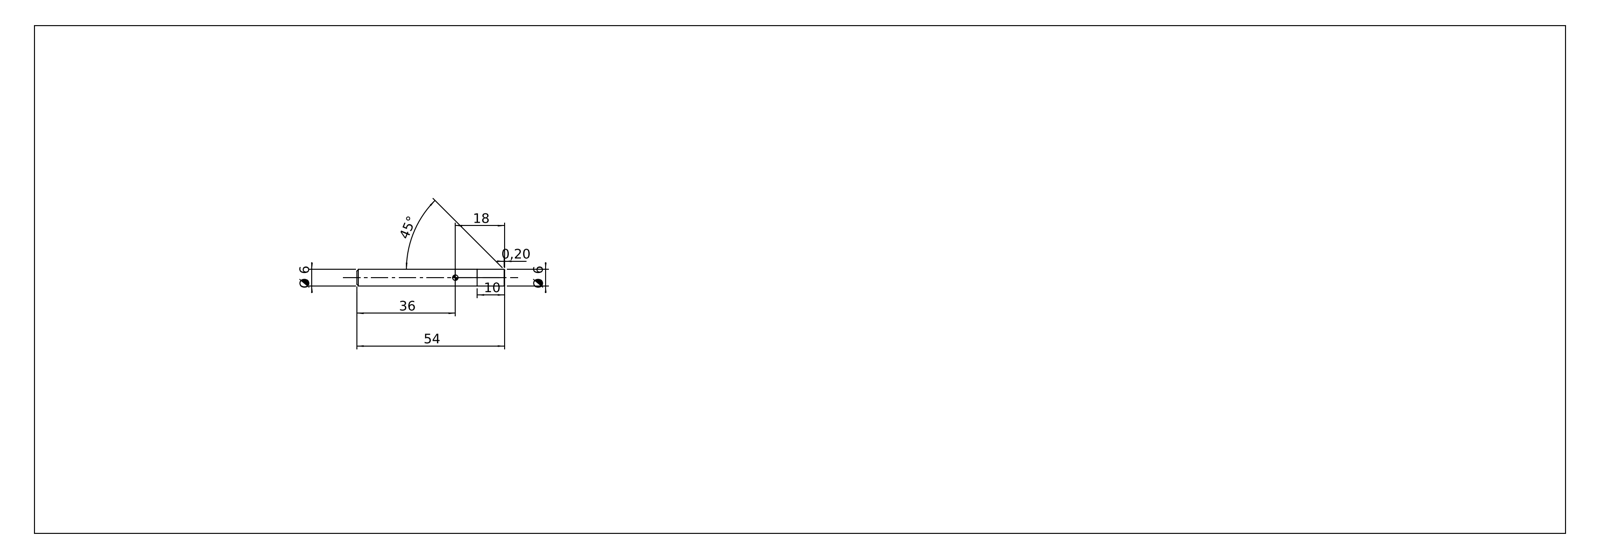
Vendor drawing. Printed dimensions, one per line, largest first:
54
45°
36
18
10
Ø 6
Ø 6
0,20
